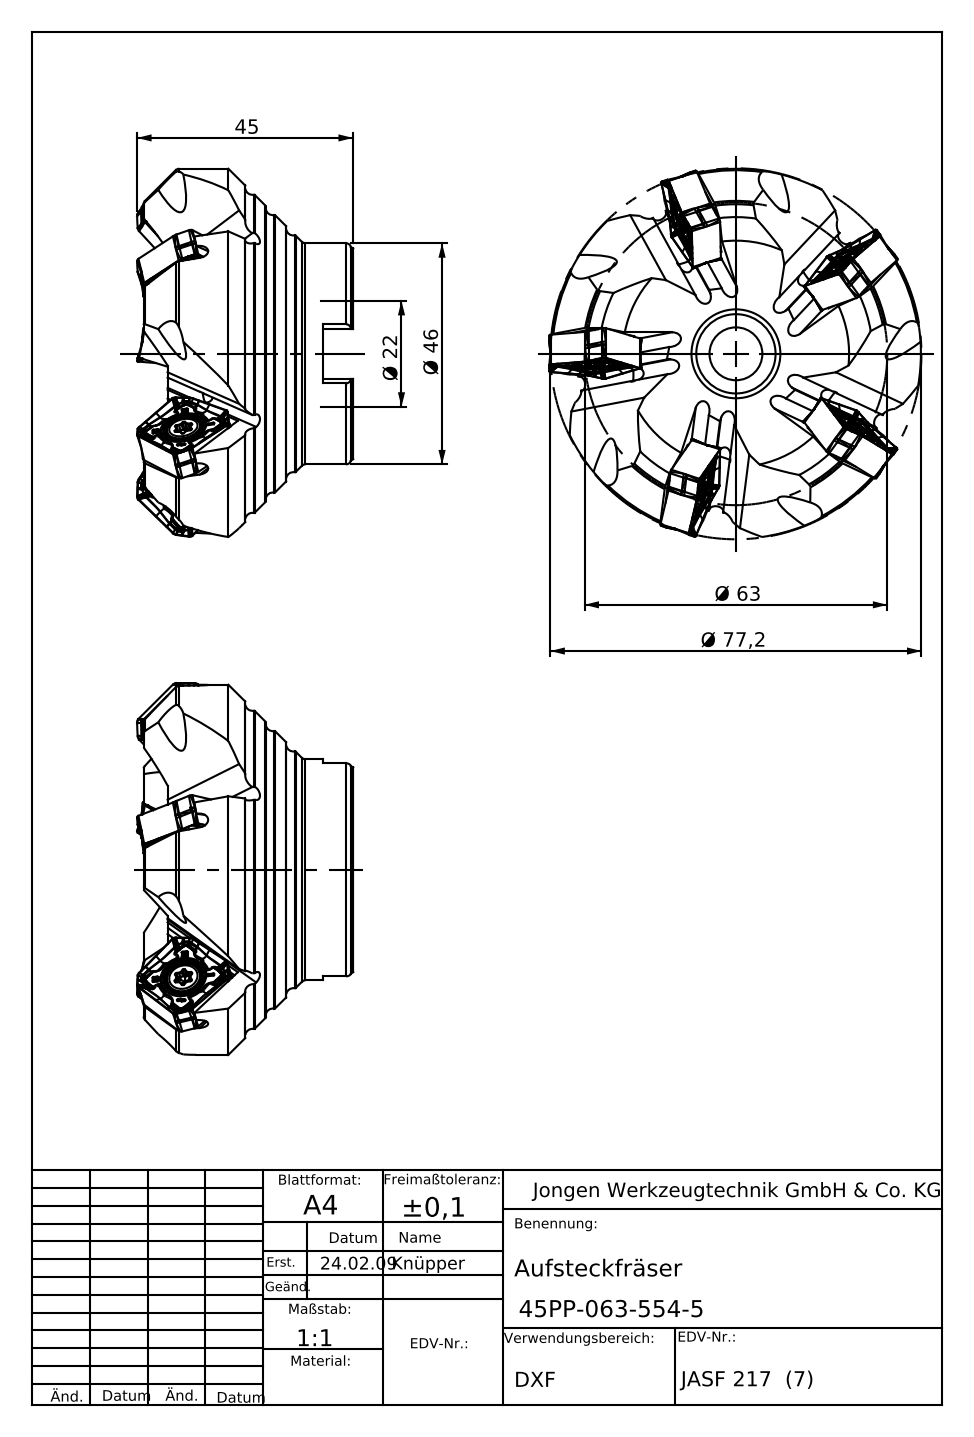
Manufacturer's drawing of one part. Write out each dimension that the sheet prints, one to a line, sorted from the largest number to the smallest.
Ø 77,2
Ø 63
Ø 46
45
Ø 22
